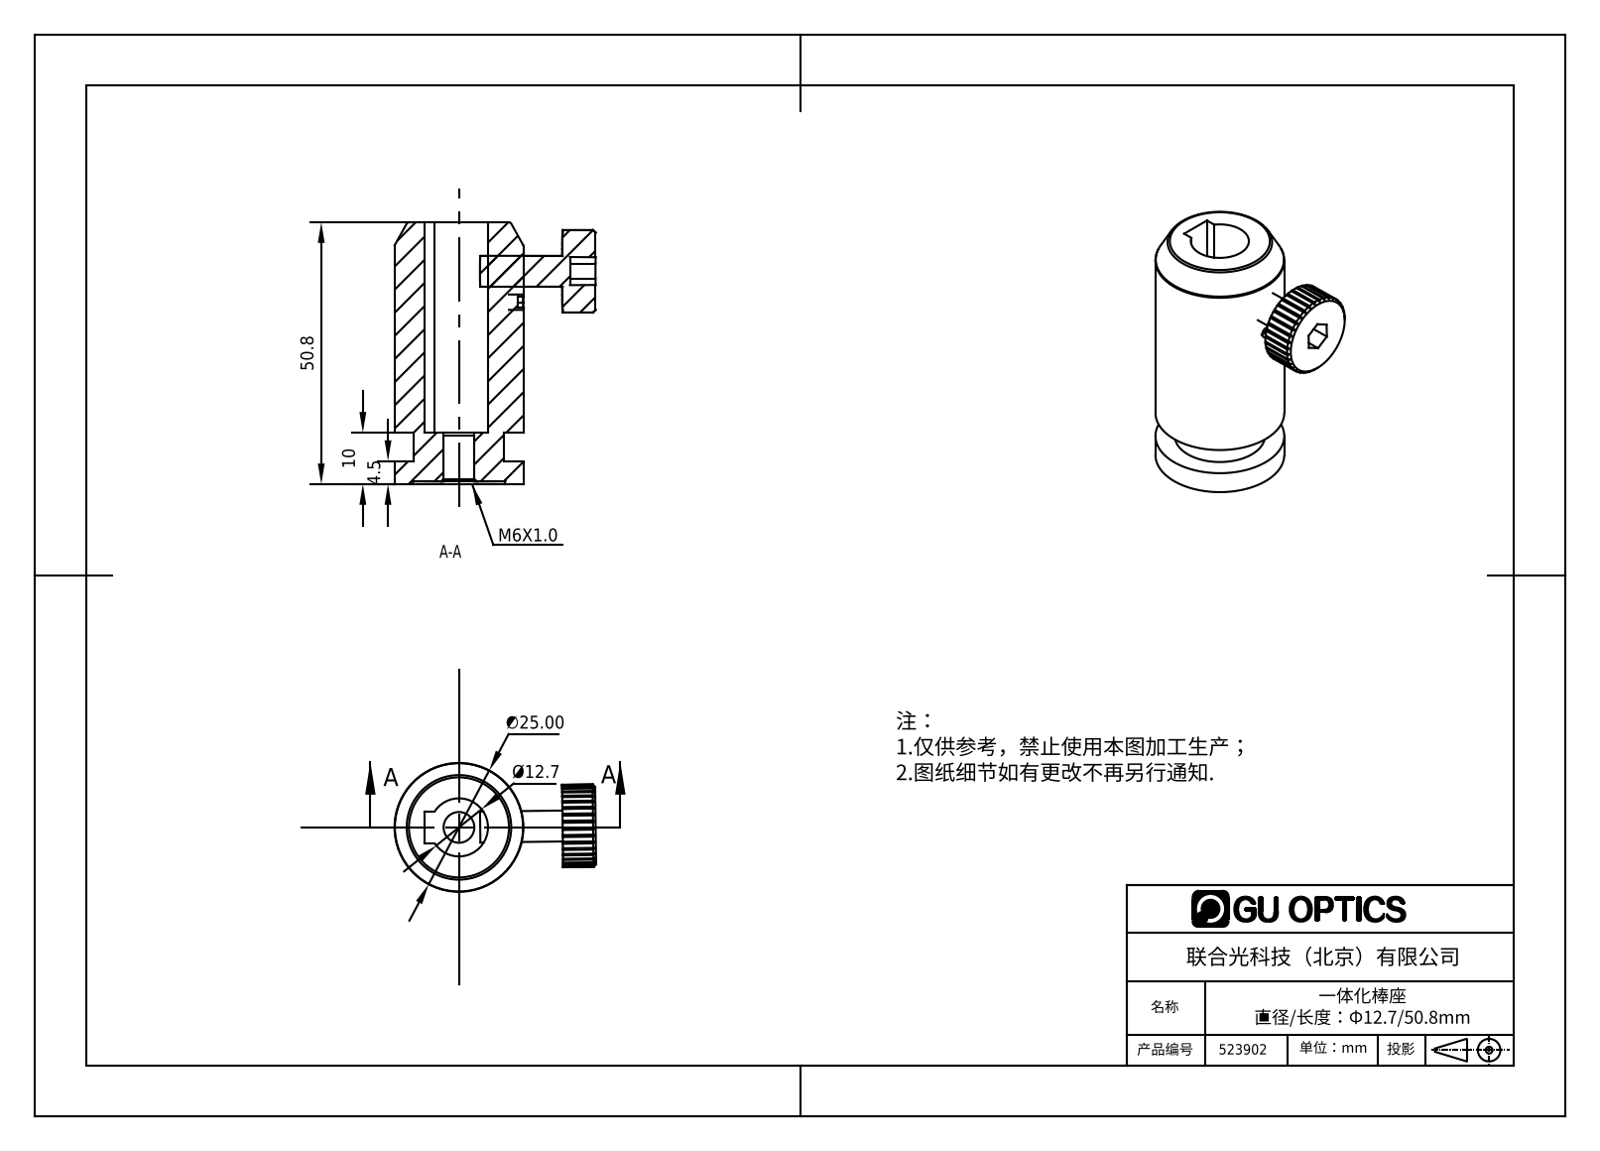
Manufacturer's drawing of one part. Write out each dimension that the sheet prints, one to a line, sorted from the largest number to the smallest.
50.8
∅25.00
Ø12.7
10
4.5
